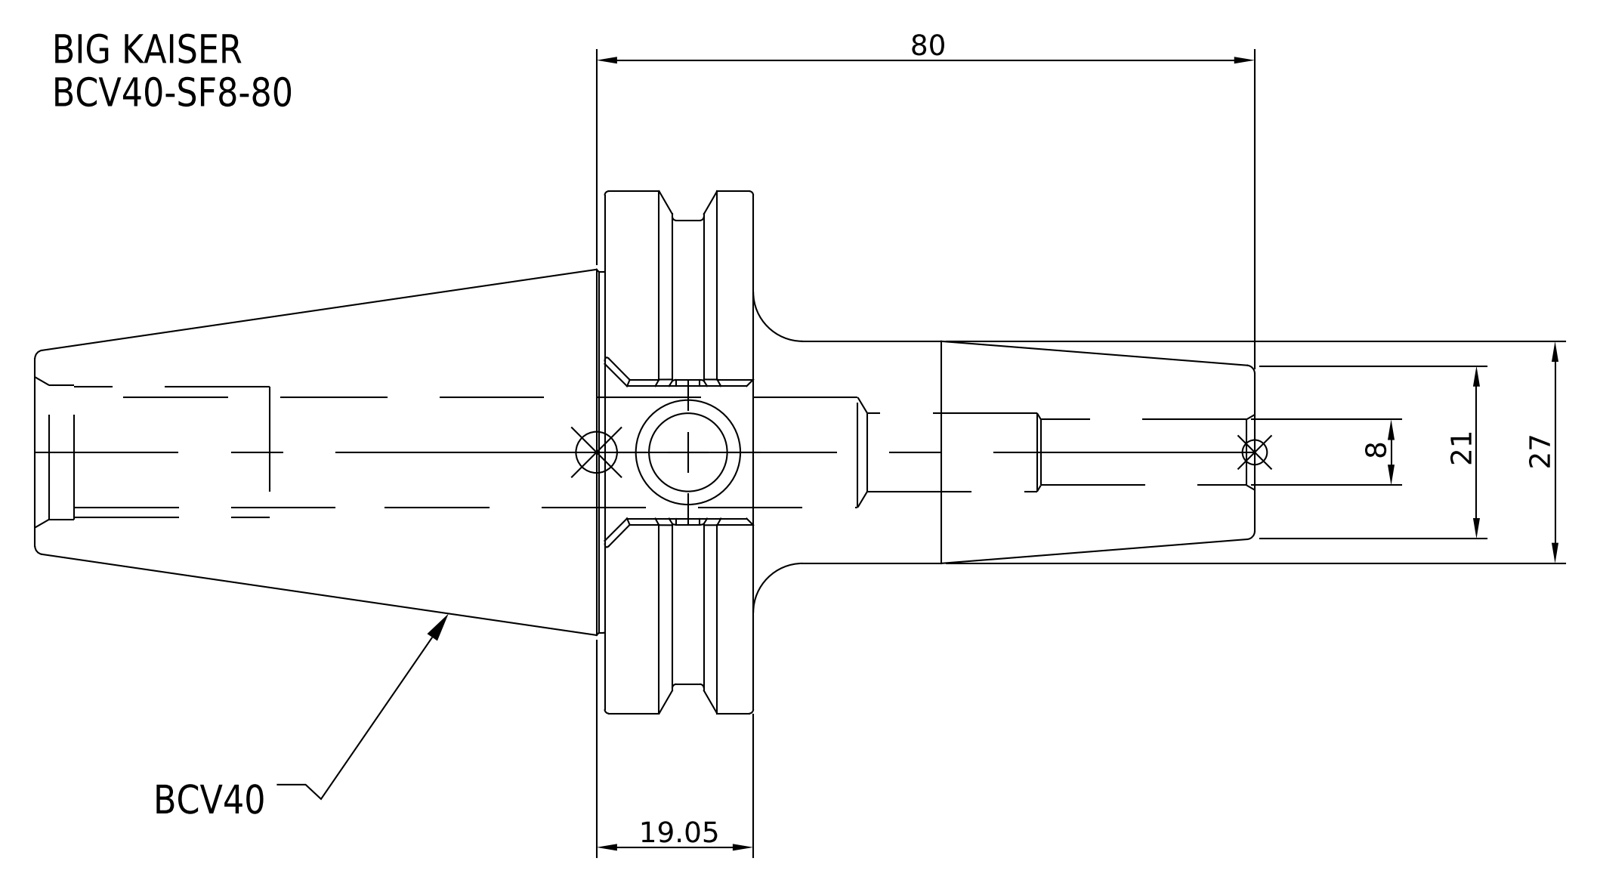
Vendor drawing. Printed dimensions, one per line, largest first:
80
27
21
19.05
8
